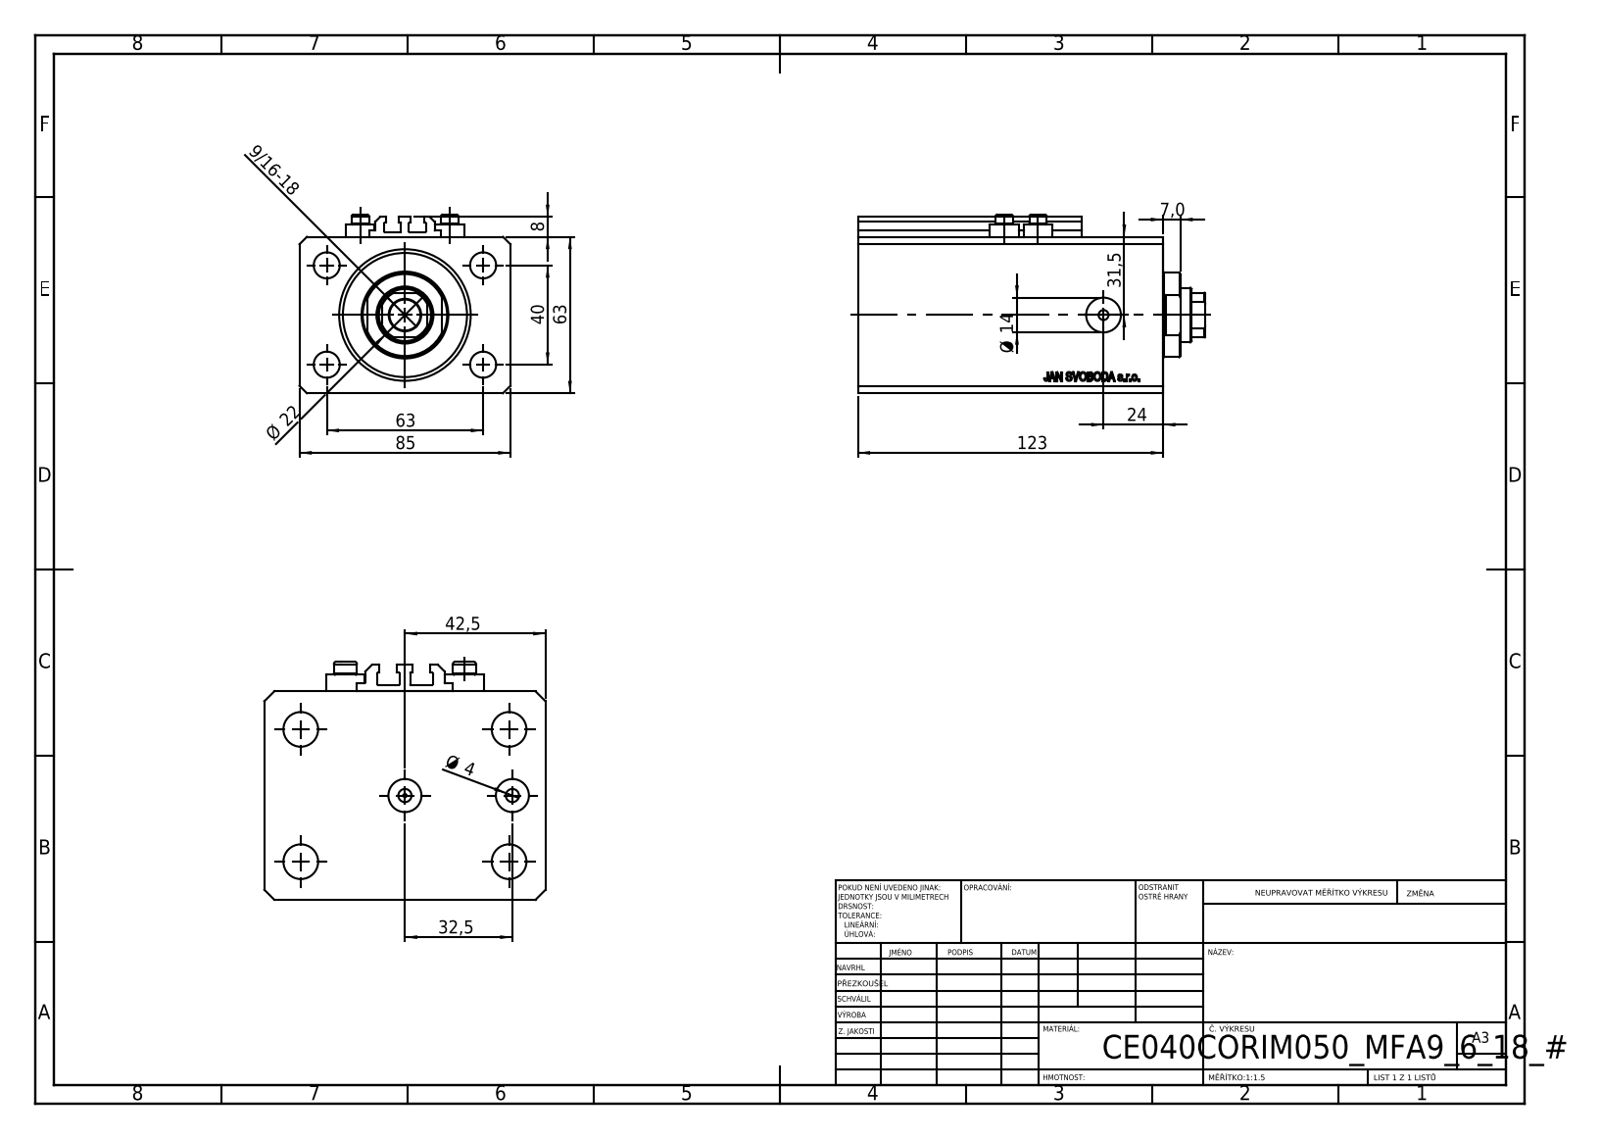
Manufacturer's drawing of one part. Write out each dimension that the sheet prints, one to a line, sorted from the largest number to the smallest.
123
85
63
63
42,5
40
32,5
31,5
24
Ø 22
Ø 14
8
7,0
Ø 4
9/16-18
